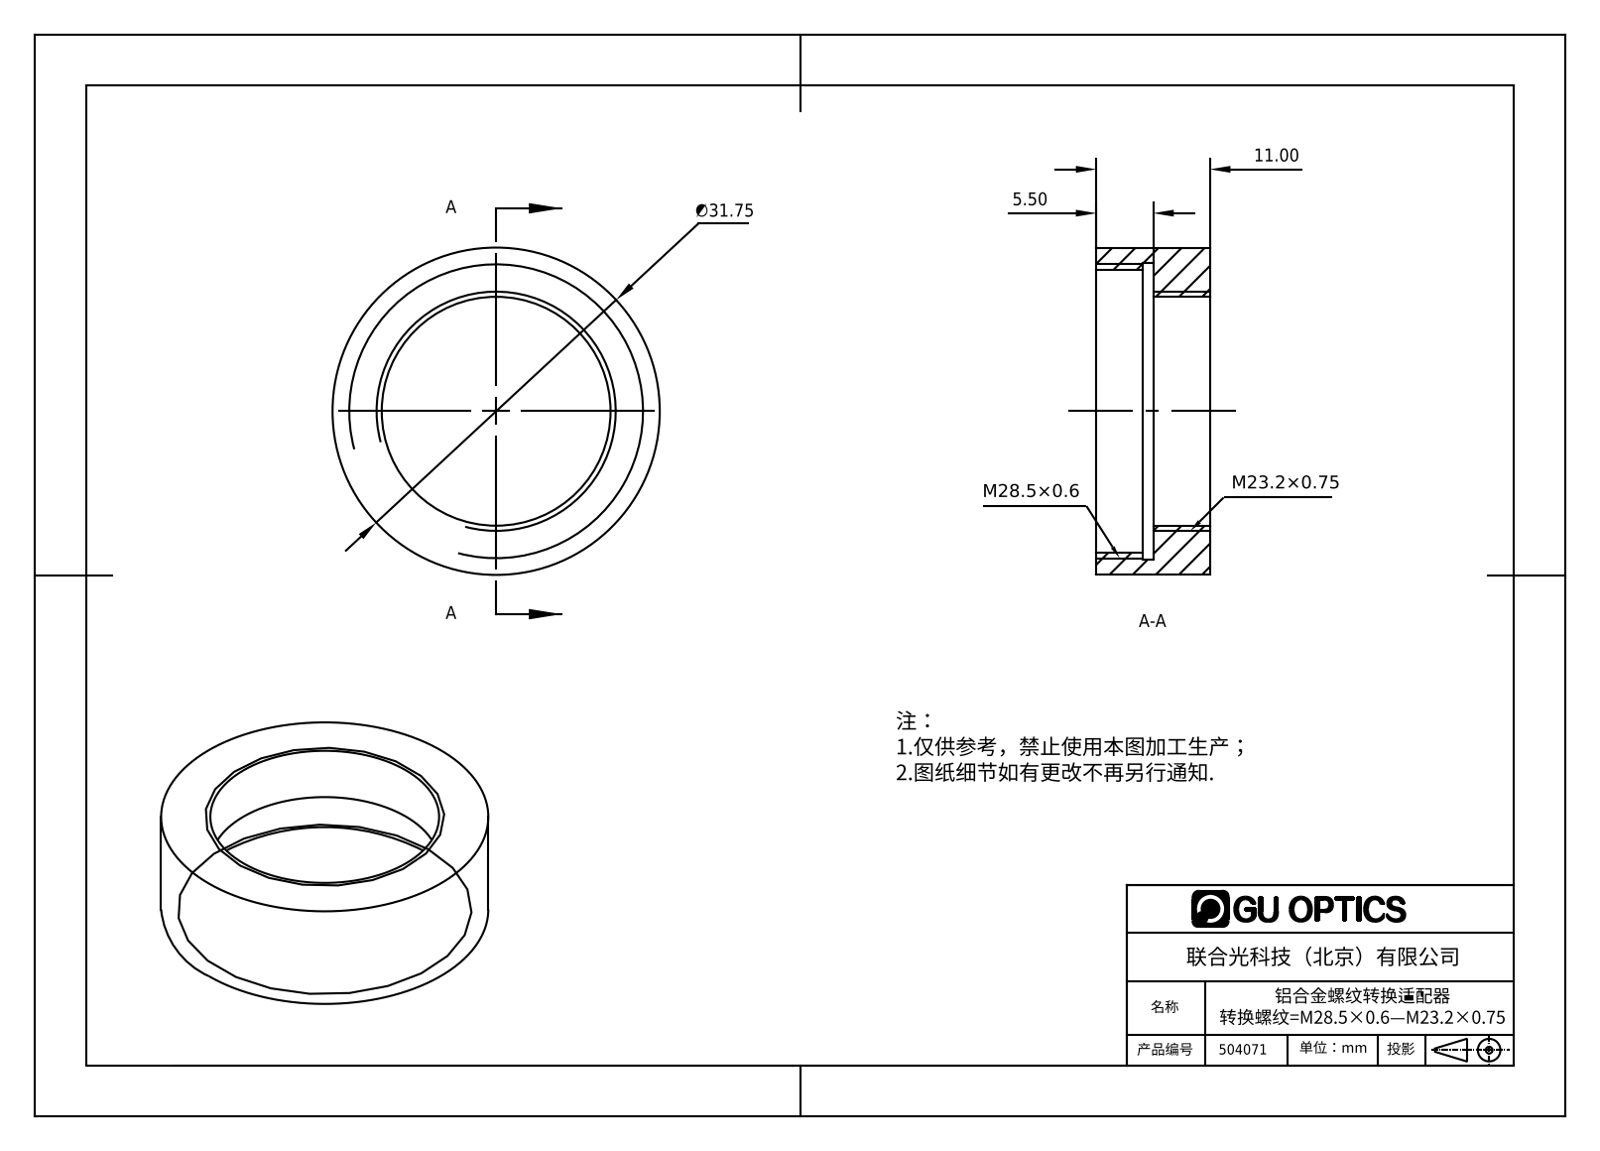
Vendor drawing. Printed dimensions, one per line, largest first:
∅31.75
11.00
5.50
